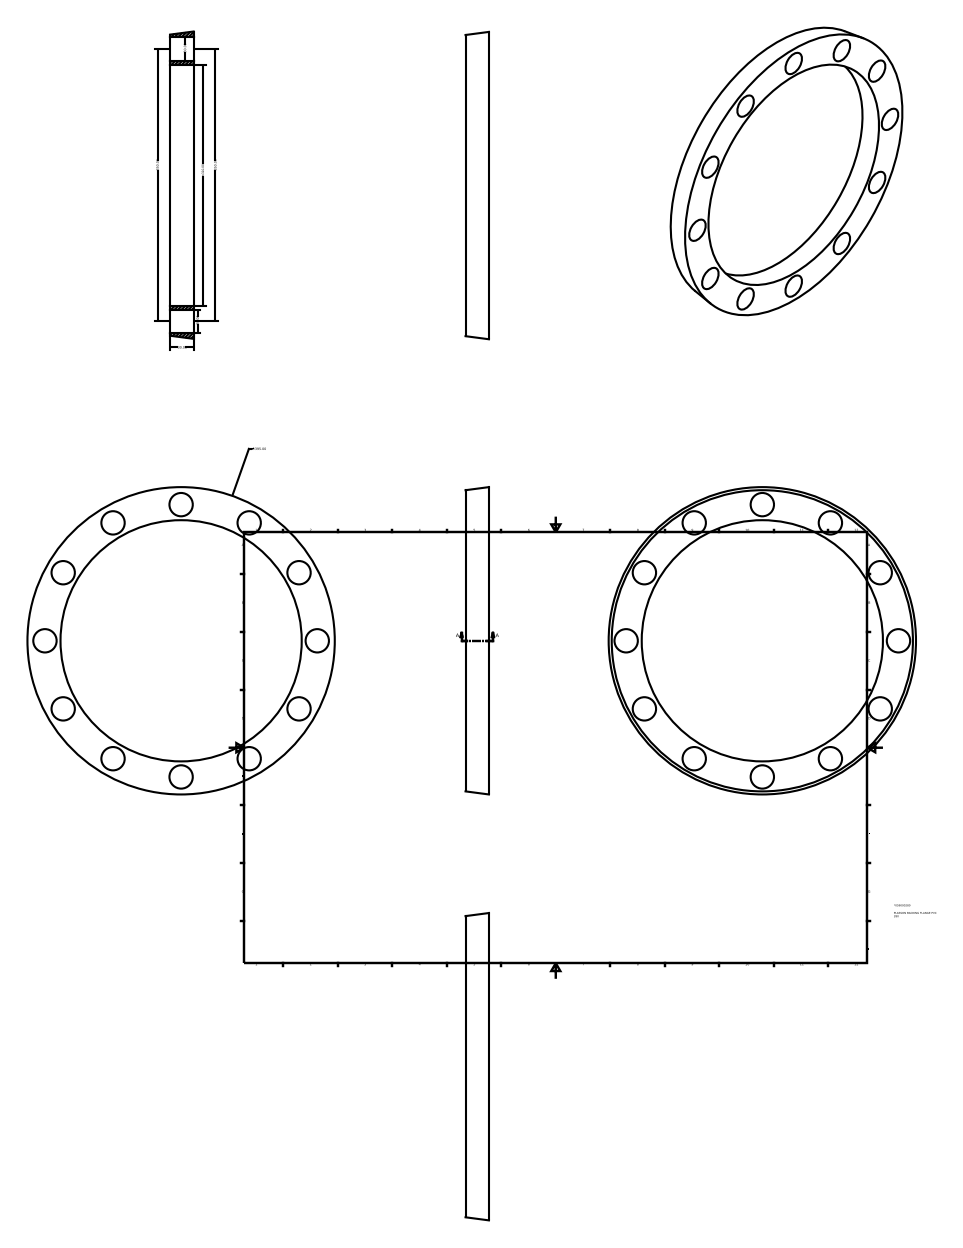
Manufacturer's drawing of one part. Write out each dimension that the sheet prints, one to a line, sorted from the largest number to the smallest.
∅395.00
350.00
350.00
n310.00
30.00
30.00
30.00
